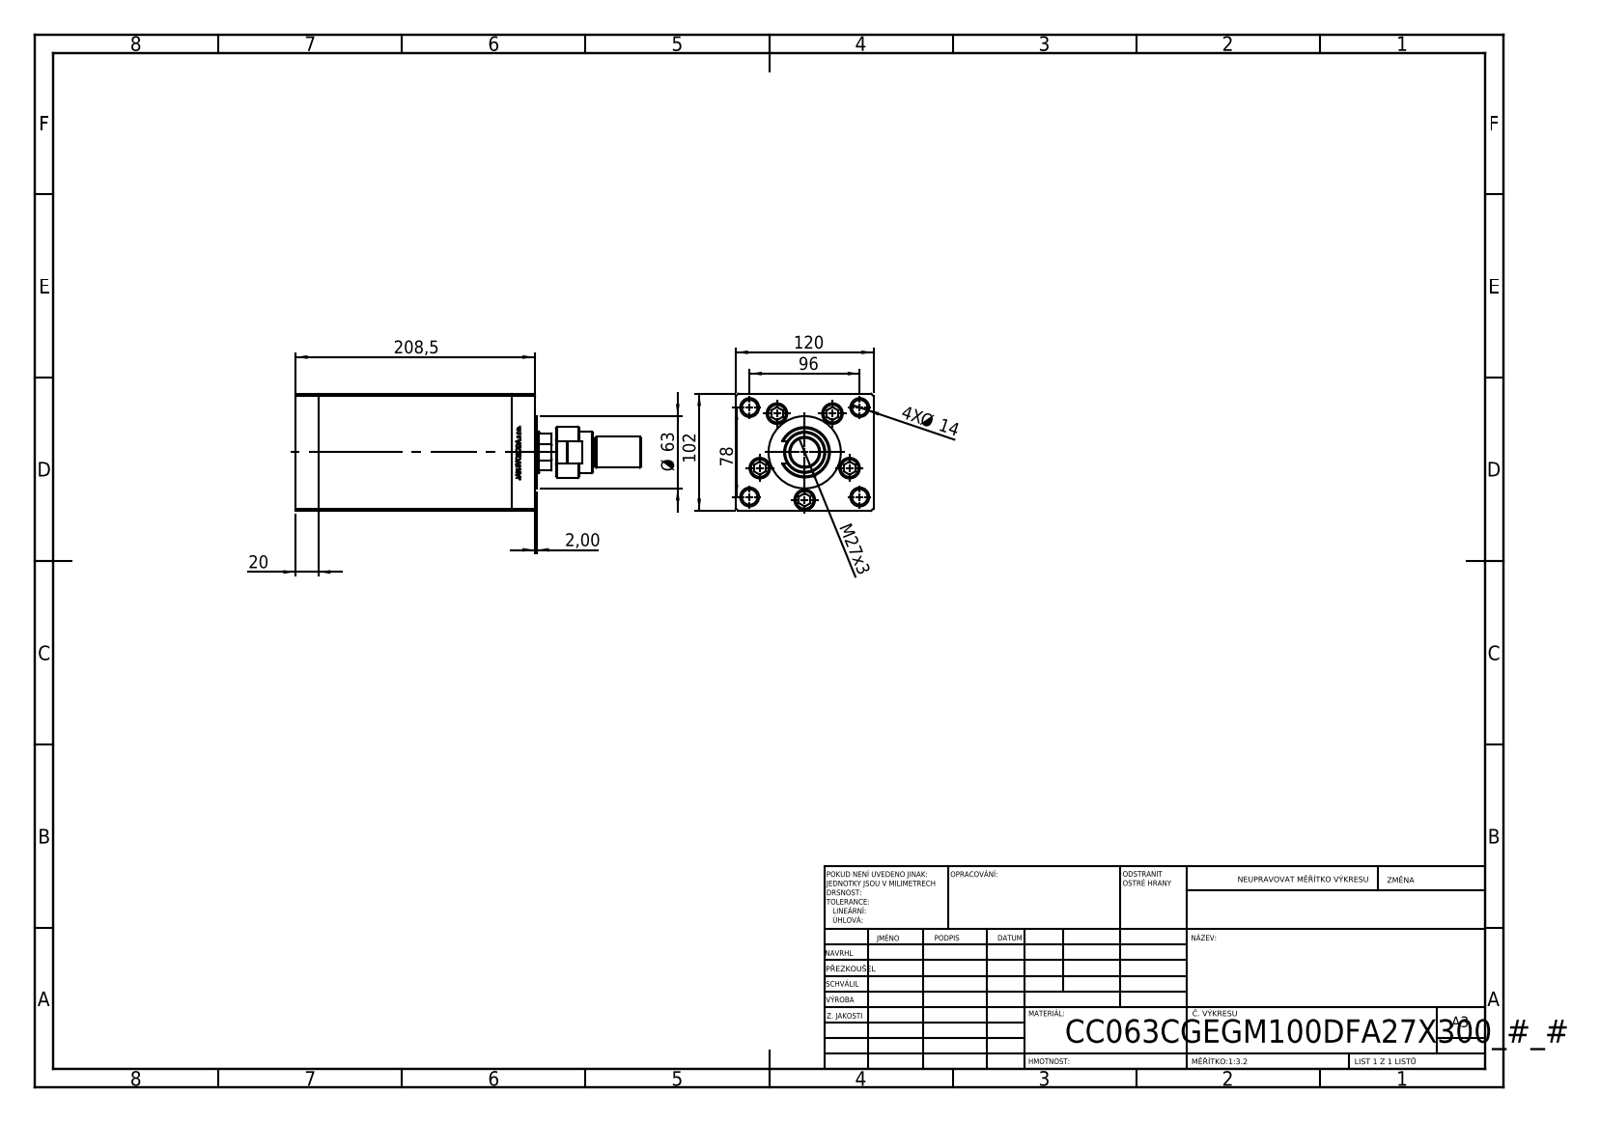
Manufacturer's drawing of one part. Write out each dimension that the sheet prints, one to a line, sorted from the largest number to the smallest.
208,5
120
102
96
78
Ø 63
M27x3
20
4X Ø 14
2,00
